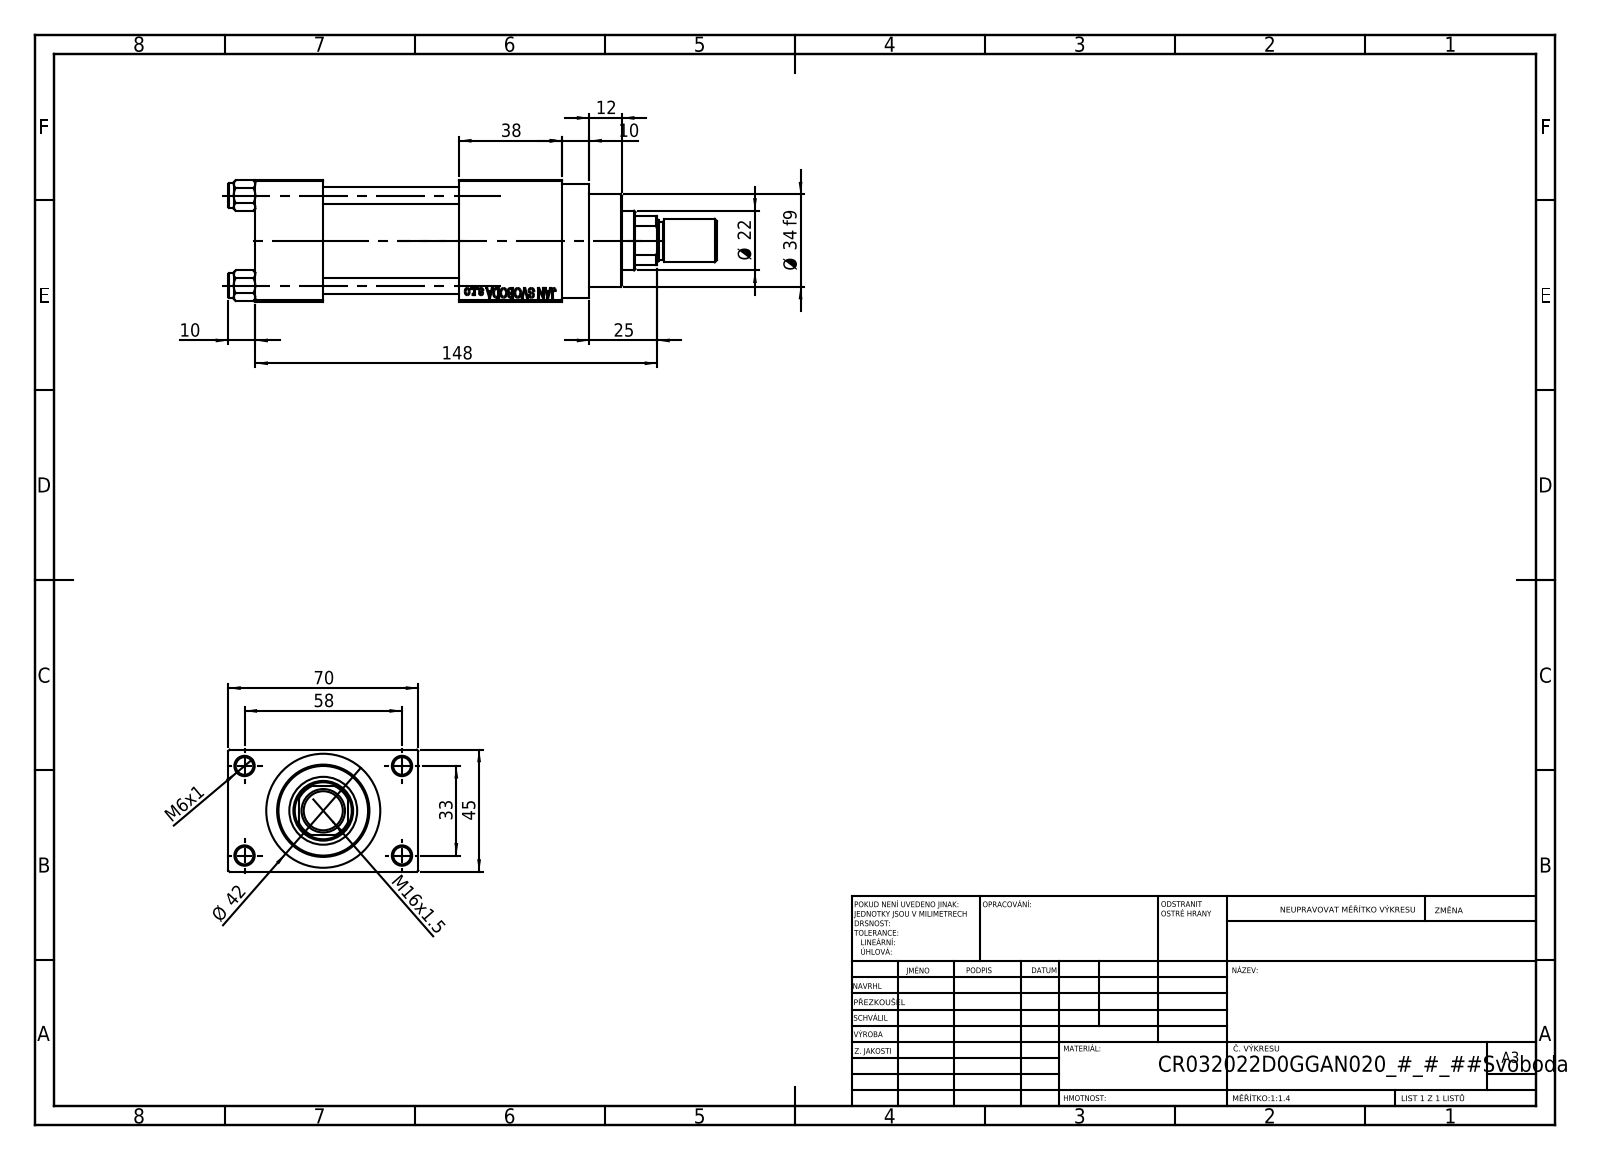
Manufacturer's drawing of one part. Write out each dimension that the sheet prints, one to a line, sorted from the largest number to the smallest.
148
70
58
45
Ø 42
38
Ø 34 f9
33
25
Ø 22
M16x1.5
12
10
10
M6x1
